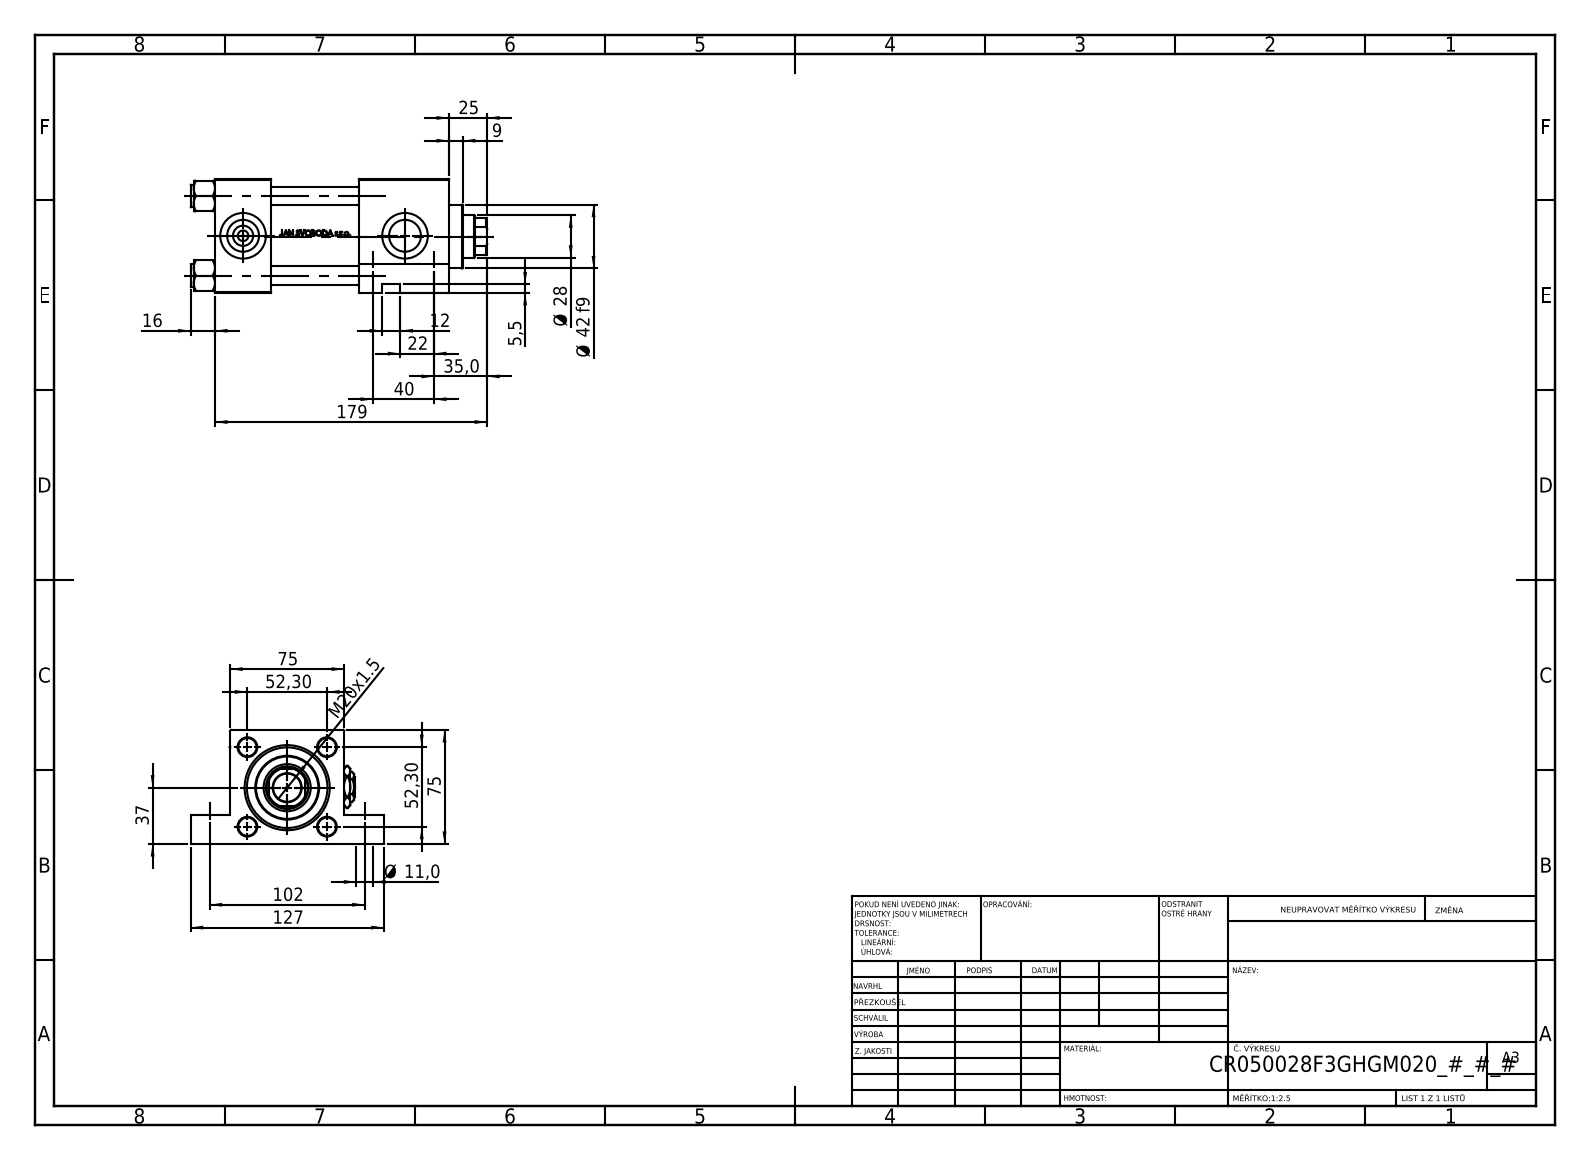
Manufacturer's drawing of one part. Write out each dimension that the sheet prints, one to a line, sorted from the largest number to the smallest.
179
127
102
75
75
52,30
52,30
Ø 42 f9
40
37
35,0
Ø 28
25
22
M20x1.5
16
12
Ø 11,0
9
5,5
